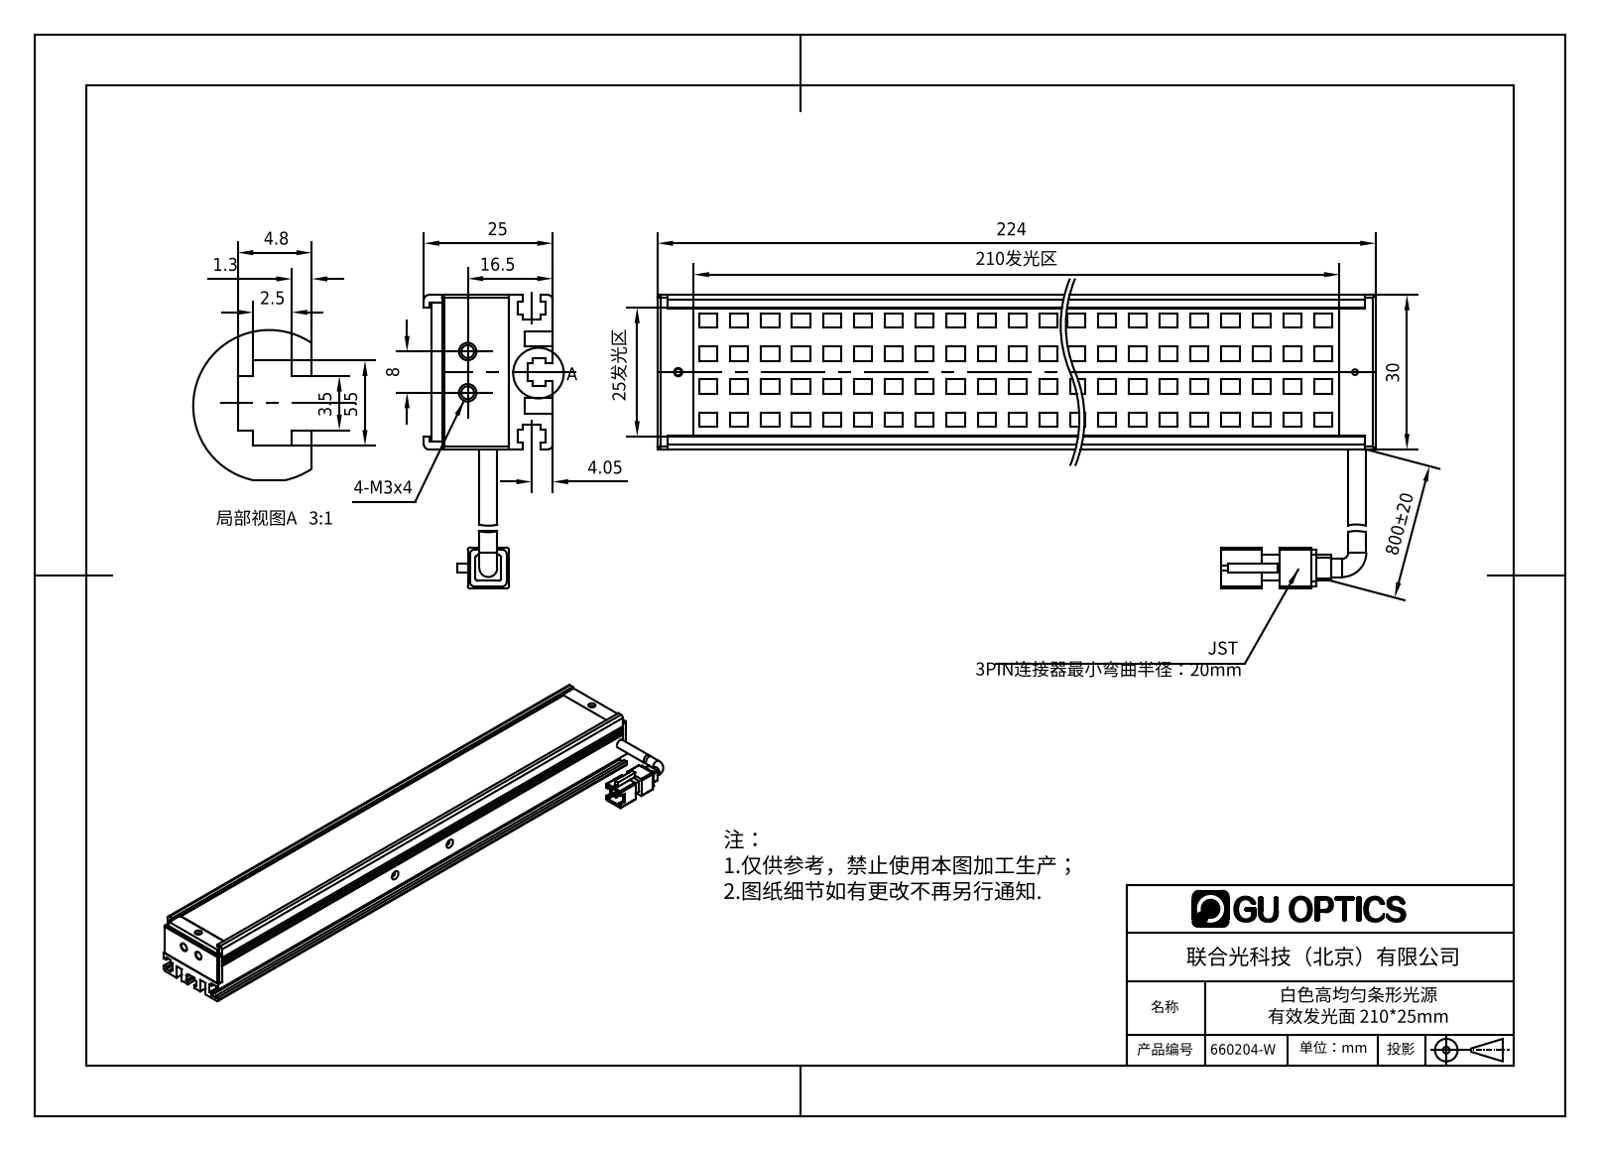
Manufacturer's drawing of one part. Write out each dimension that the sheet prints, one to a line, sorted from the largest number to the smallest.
800±20
224
210发光区
30
25发光区
25
16.5
8
5.5
4.8
4.05
3.5
2.5
1.3
